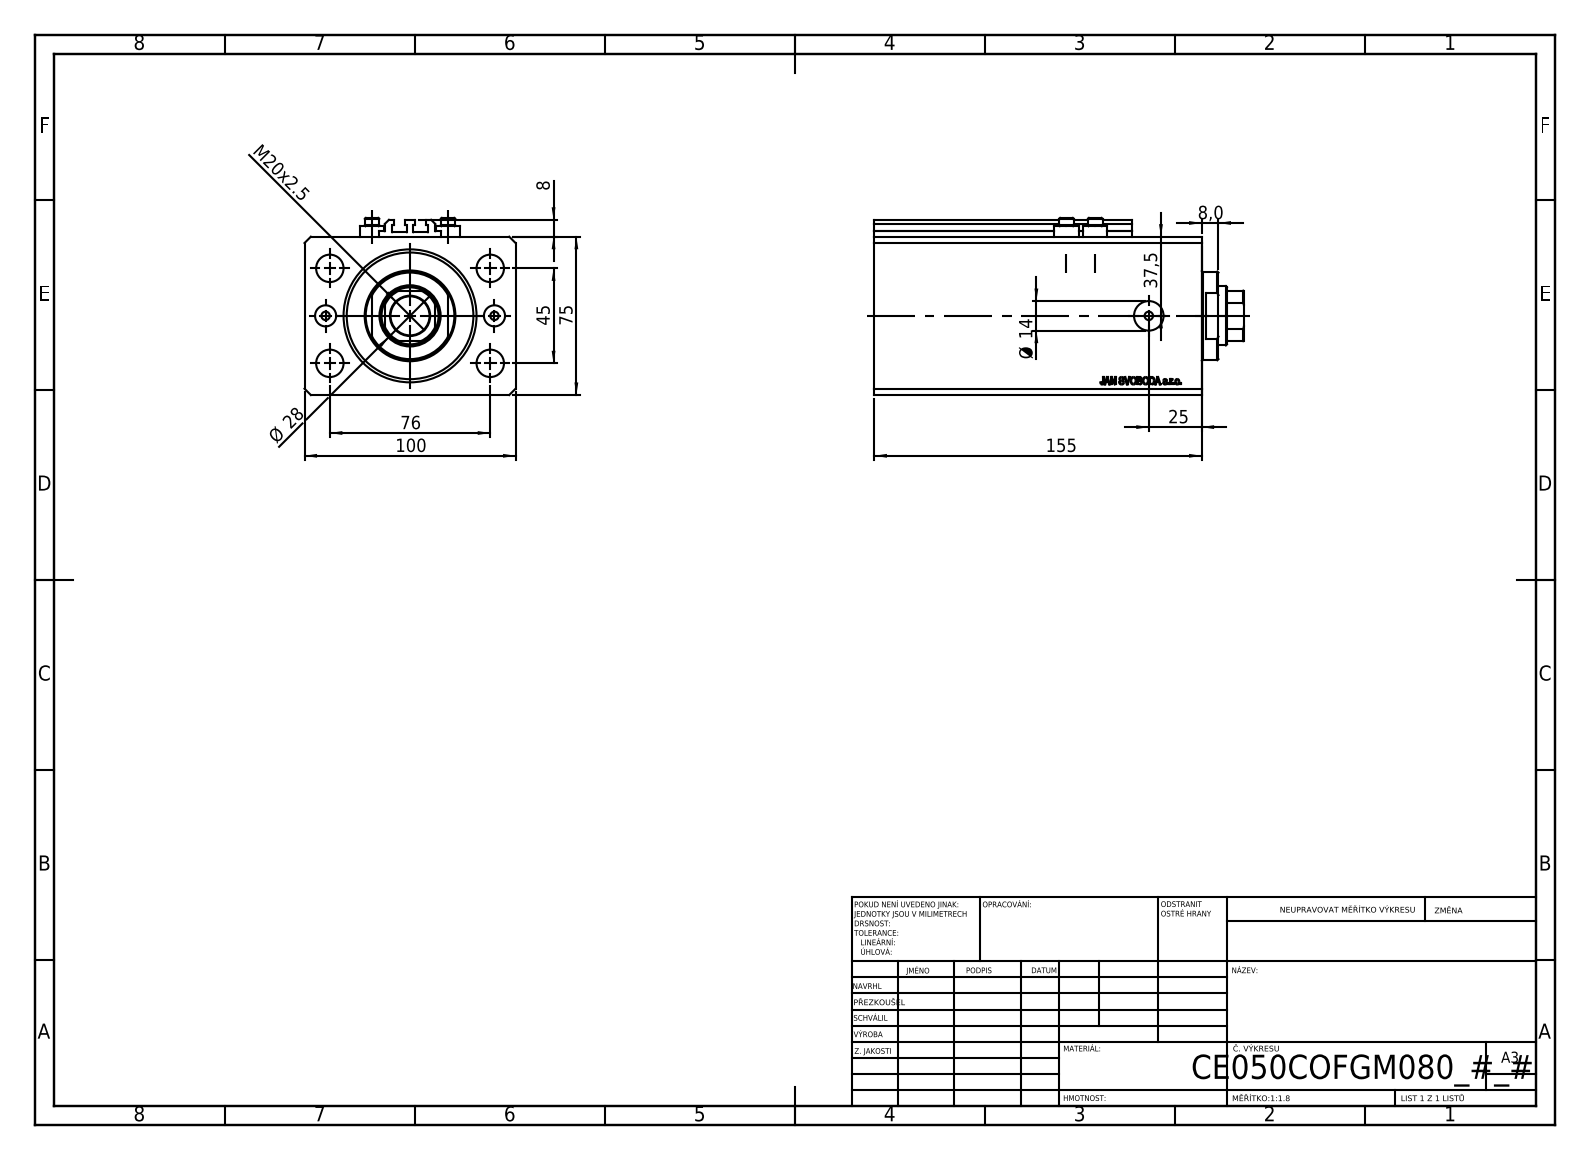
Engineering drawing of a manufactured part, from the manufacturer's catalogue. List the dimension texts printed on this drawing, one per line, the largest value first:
155
100
76
75
45
37,5
Ø 28
25
M20x2.5
Ø 14
8
8,0
